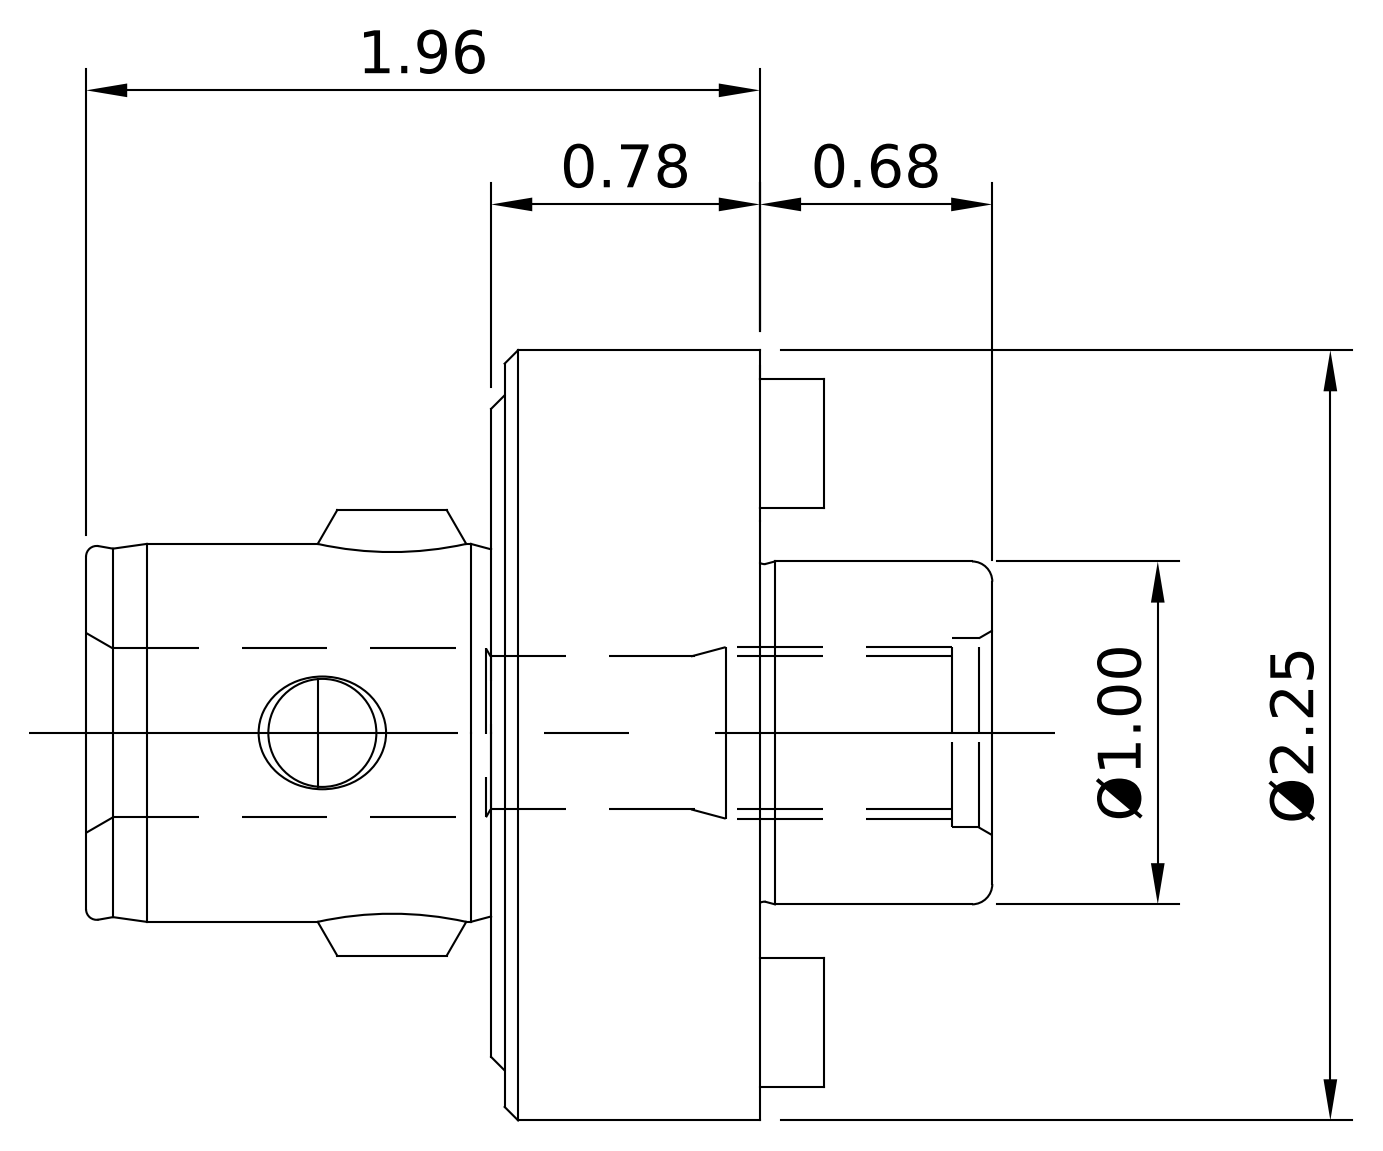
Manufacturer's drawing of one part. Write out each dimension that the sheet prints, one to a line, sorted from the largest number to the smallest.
Ø2.25
1.96
Ø1.00
0.78
0.68
